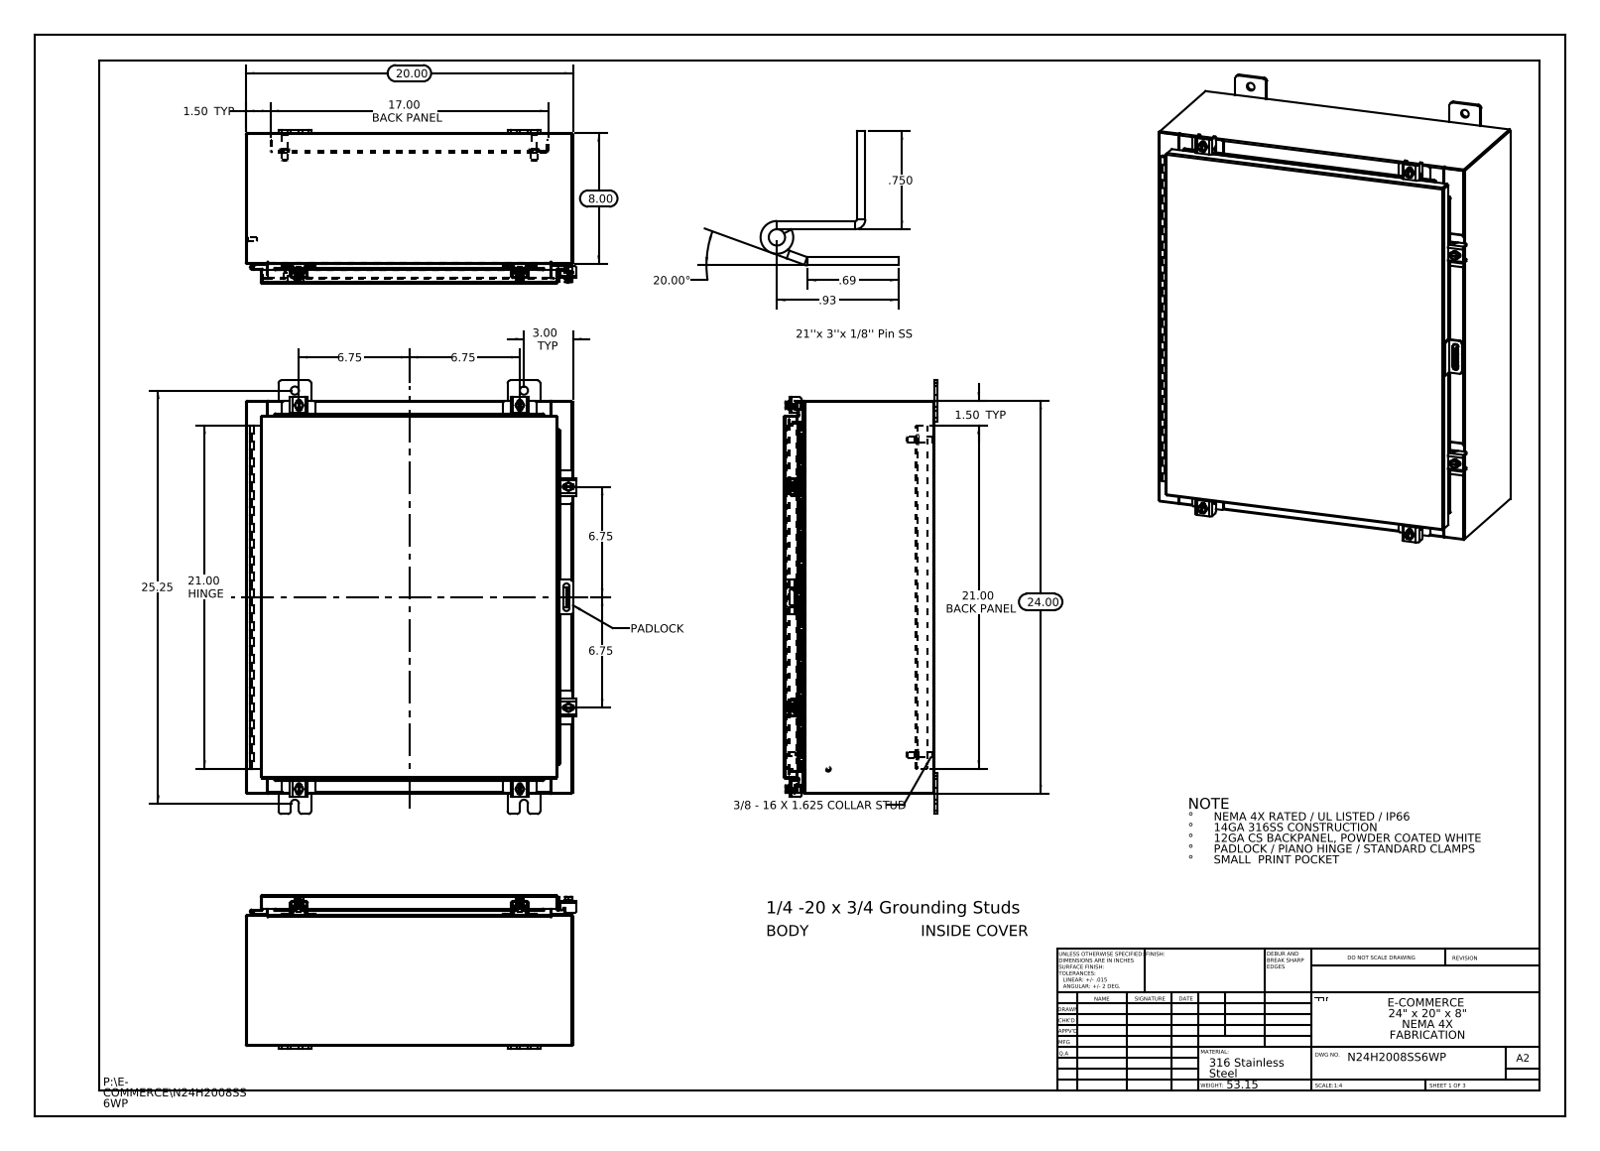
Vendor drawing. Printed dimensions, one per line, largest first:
25.25
24.00
21.00 HINGE
21.00 BACK PANEL
20.00
20.00°
17.00 BACK PANEL
8.00
6.75
6.75
6.75
6.75
3.00 TYP
1.50 TYP
1.50 TYP
.93
.750
.69
